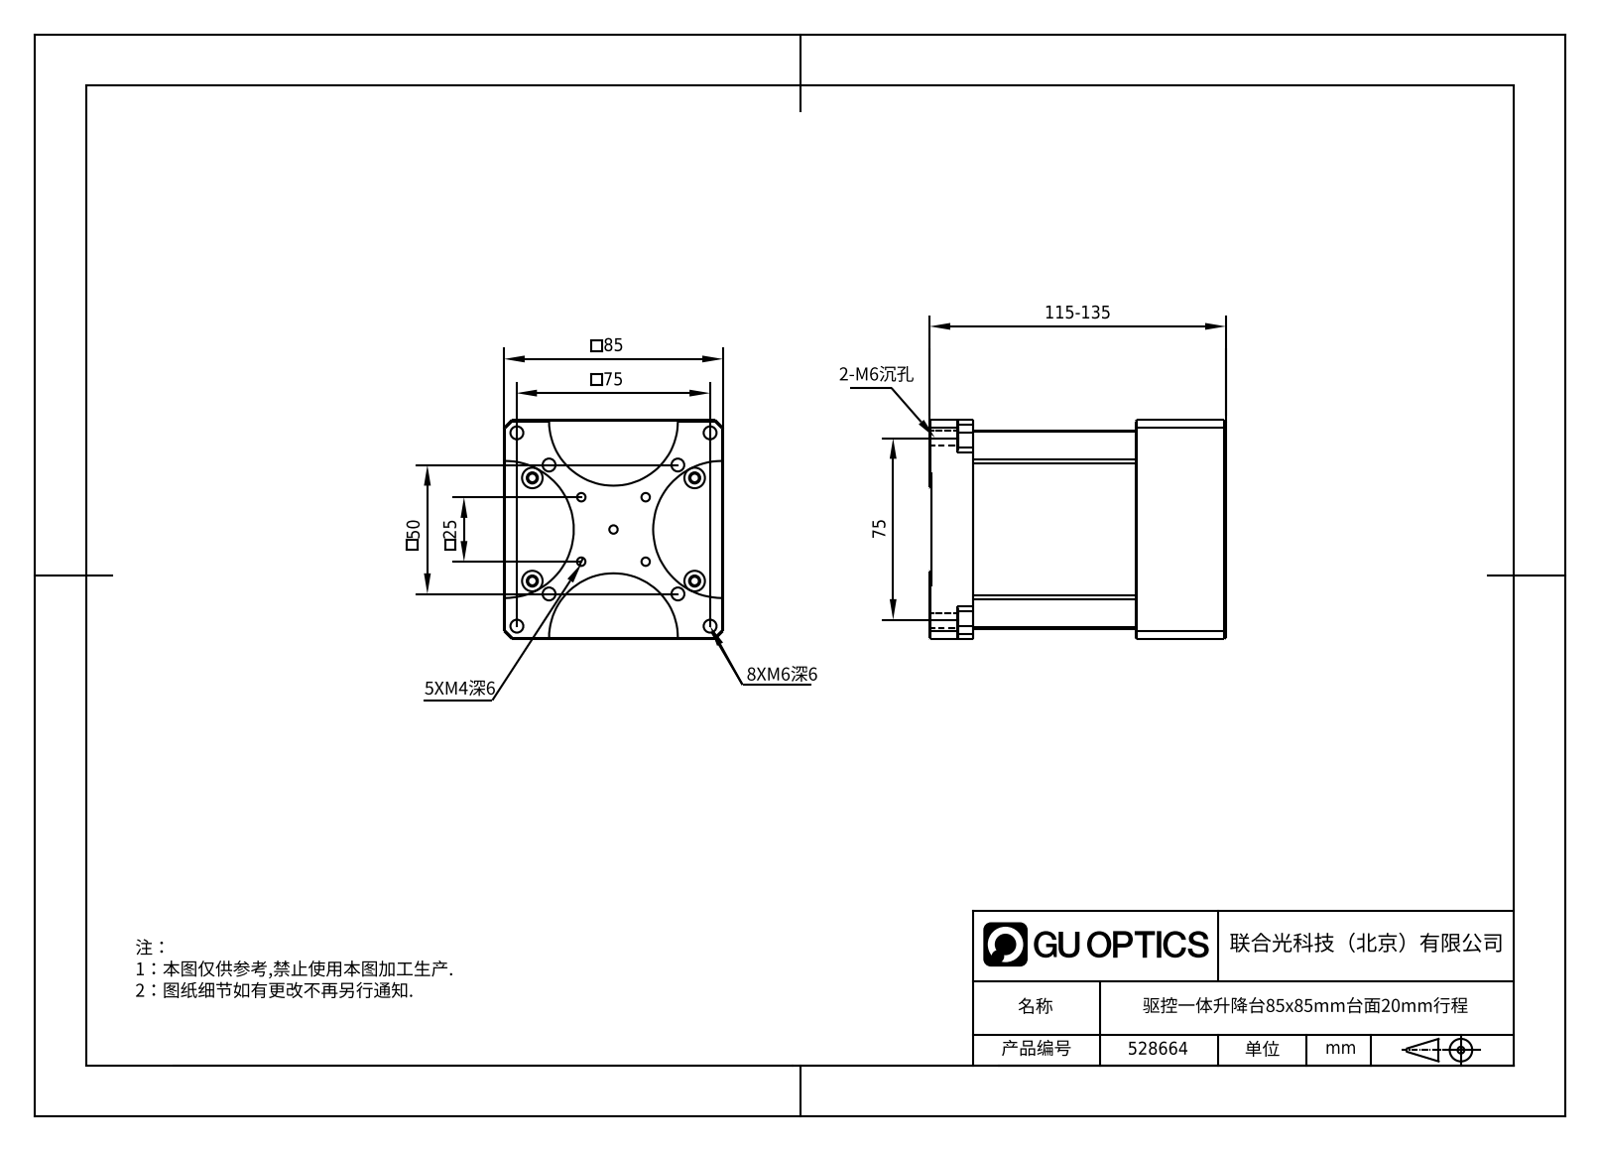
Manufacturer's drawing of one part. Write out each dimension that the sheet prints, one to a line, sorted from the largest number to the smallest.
115-135
85
75
75
50
25
